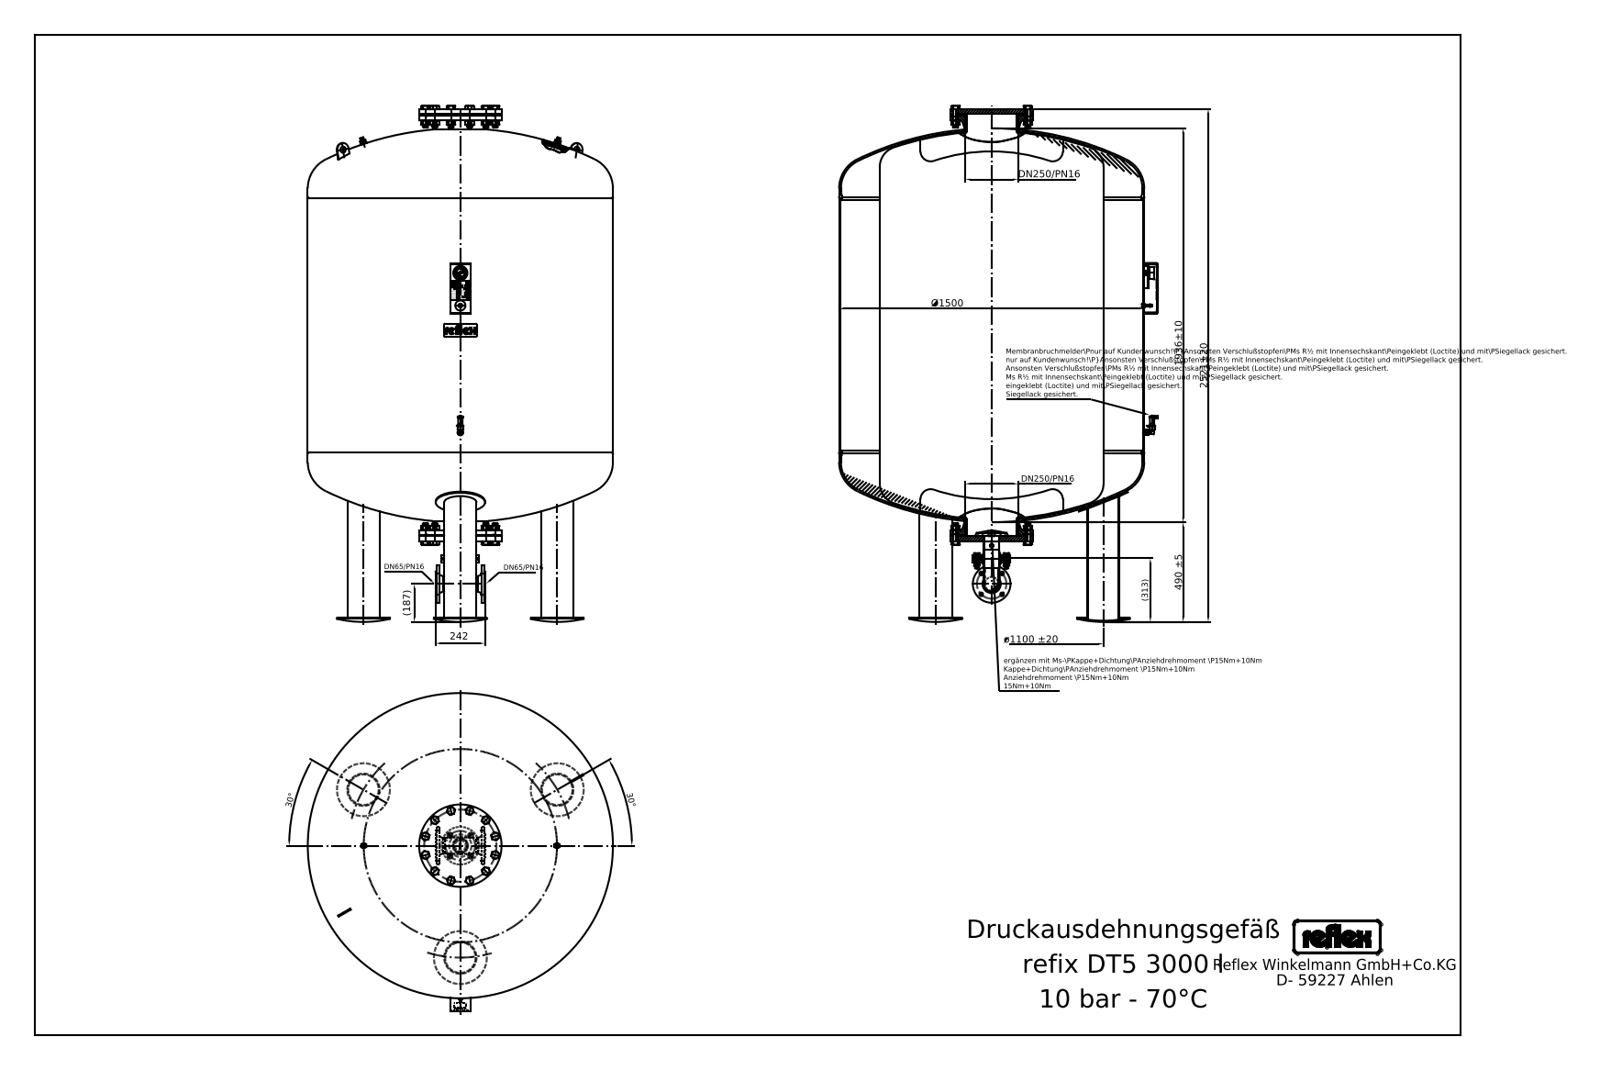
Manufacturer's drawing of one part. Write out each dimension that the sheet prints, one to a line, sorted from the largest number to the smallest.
2521±20
1936±10
Ø1500
ø1100 ±20
490 ±5
(313)
DN250/PN16
DN250/PN16
242
(187)
30°
30°
